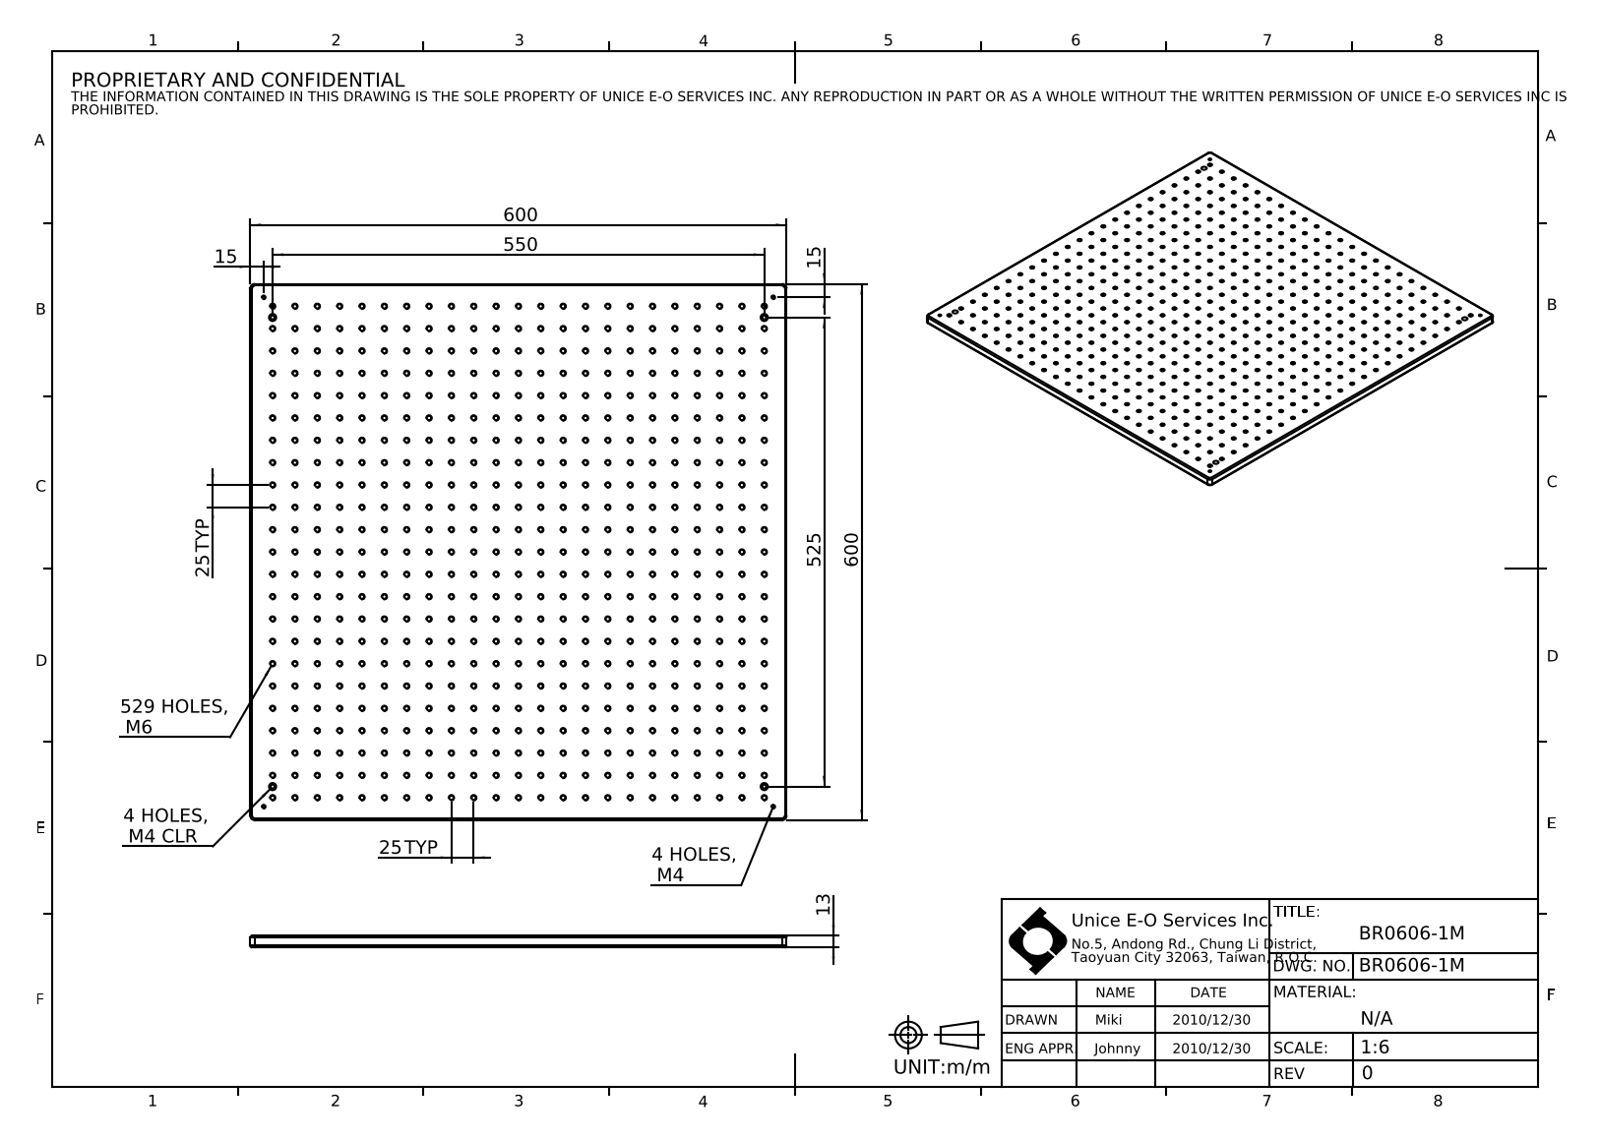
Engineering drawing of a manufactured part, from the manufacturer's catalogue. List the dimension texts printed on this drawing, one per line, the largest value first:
600
600
550
529 HOLES, M6
525
25 TYP
25 TYP
15
15
13
4 HOLES, M4
4 HOLES, M4 CLR
